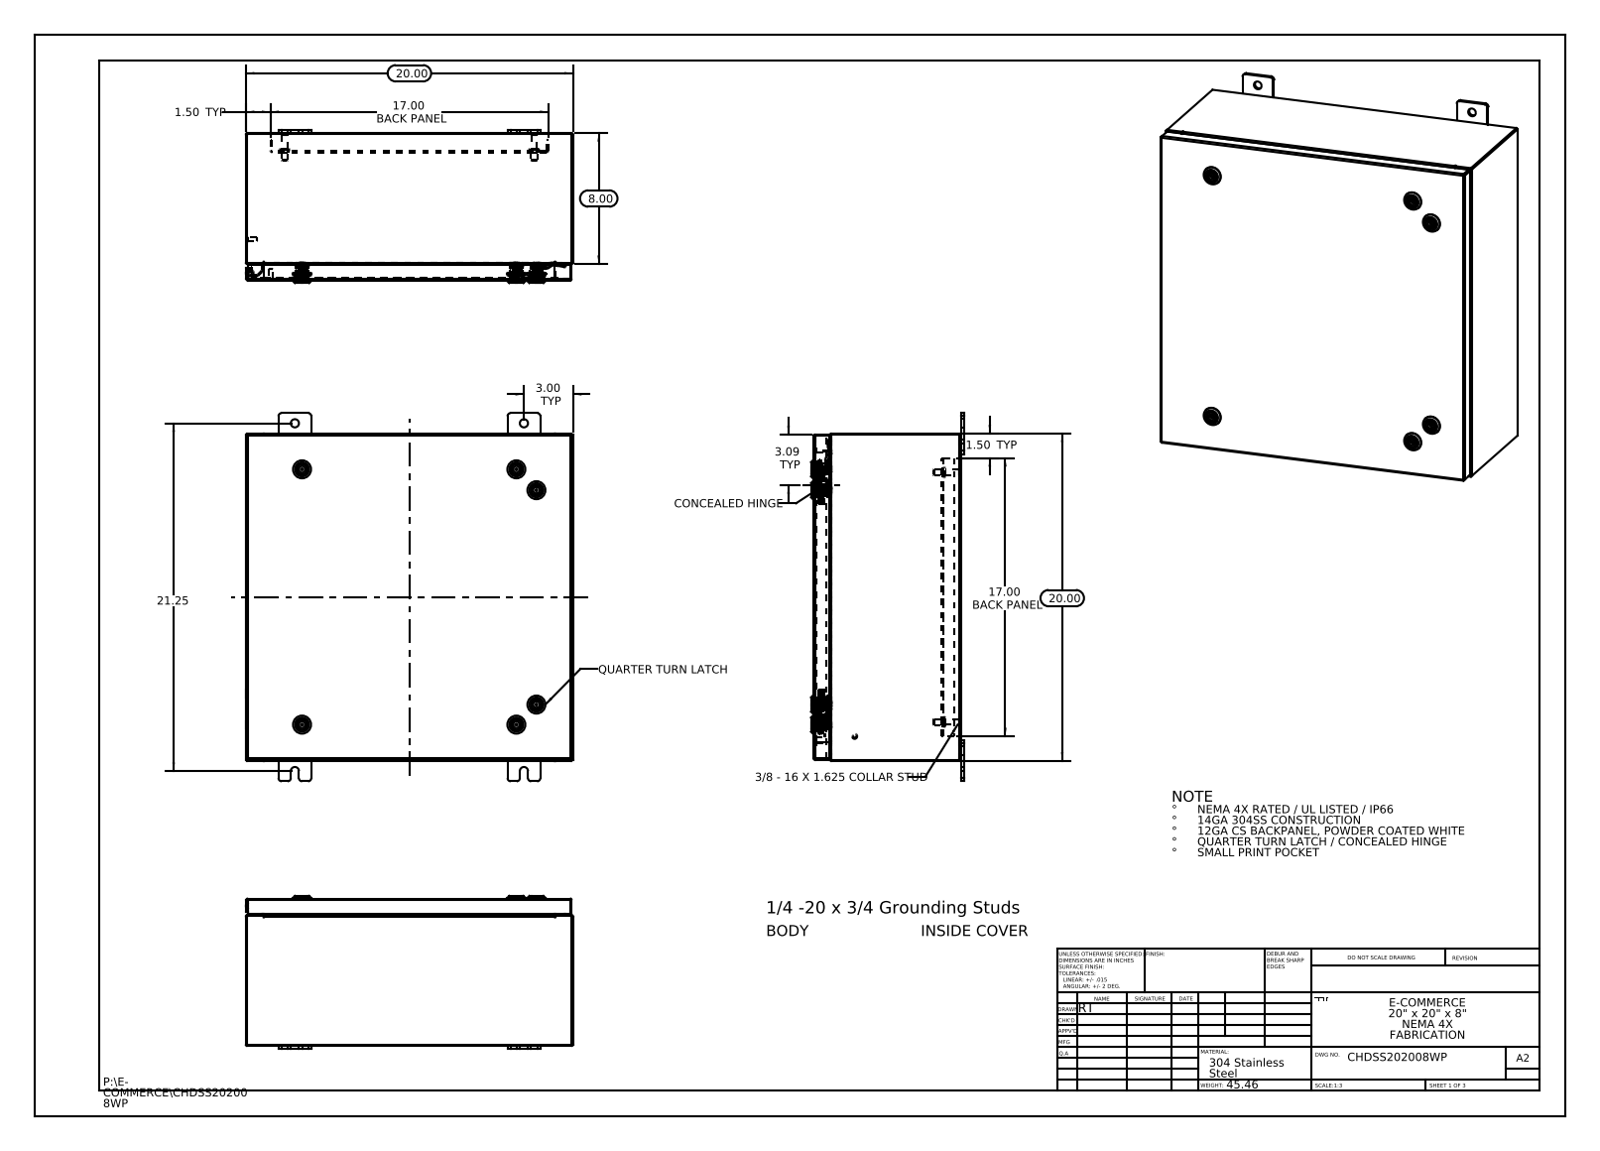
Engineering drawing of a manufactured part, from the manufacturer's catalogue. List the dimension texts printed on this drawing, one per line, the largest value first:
21.25
20.00
20.00
17.00 BACK PANEL
17.00 BACK PANEL
8.00
3.09 TYP
3.00 TYP
1.50 TYP
1.50 TYP
